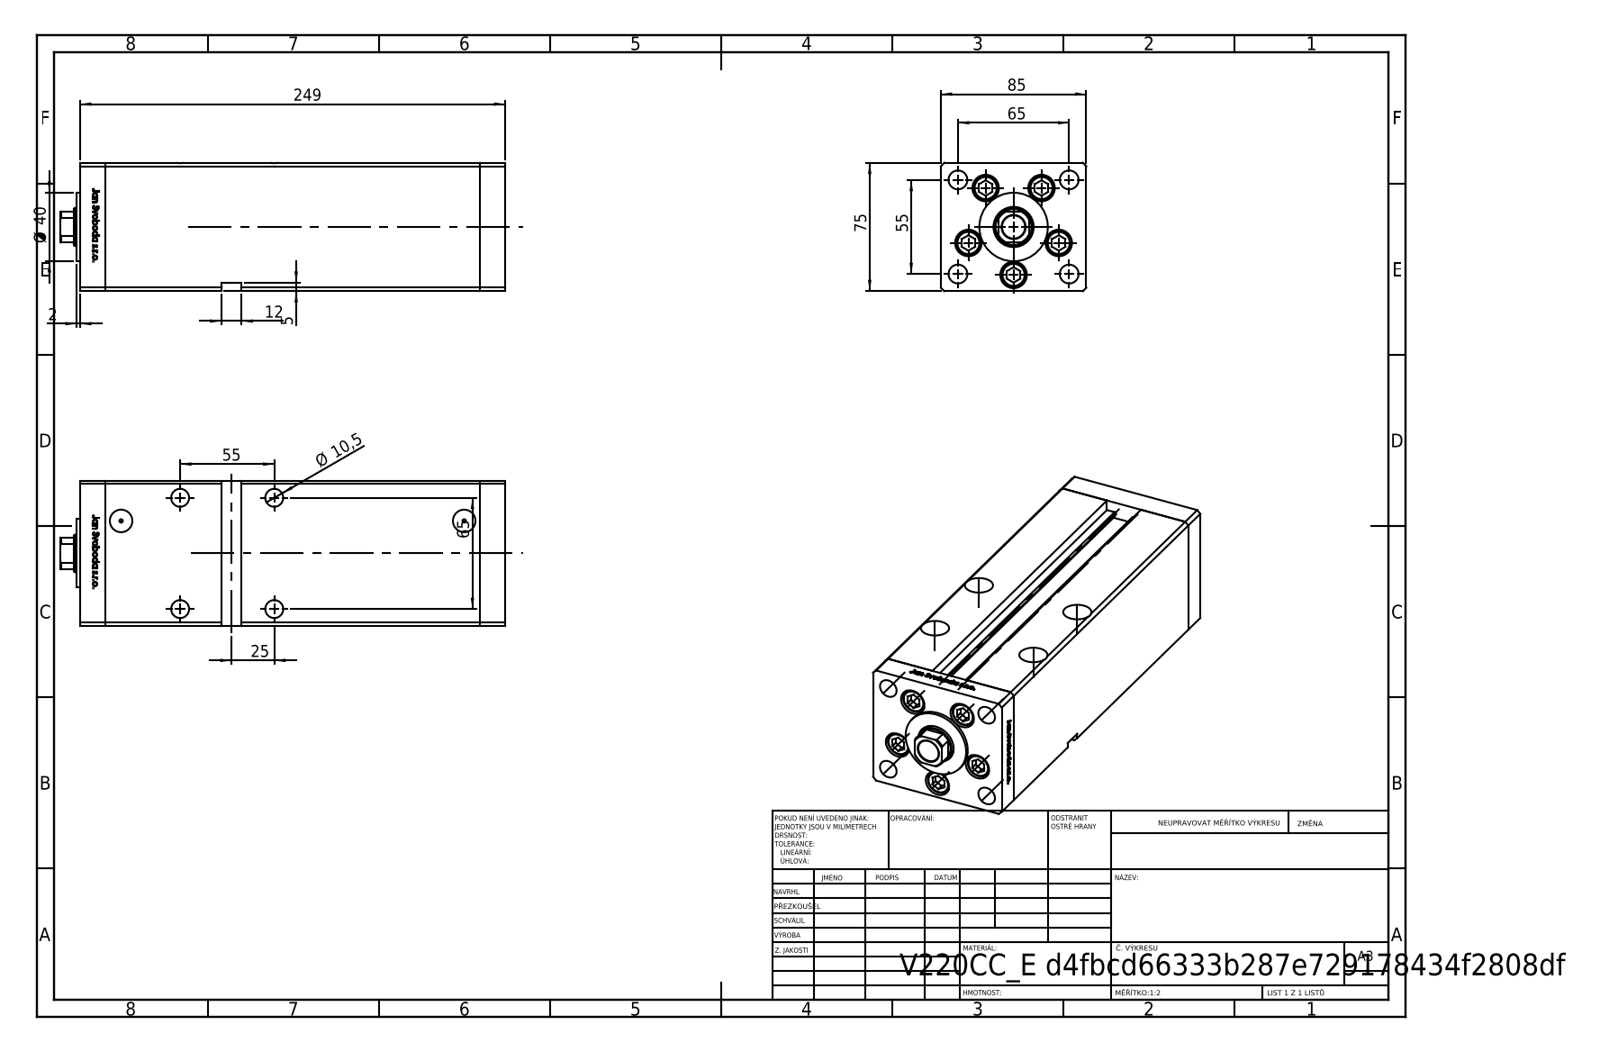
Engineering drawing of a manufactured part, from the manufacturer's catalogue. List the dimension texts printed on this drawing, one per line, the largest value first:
249
85
75
65
65
55
55
Ø 40
25
12
Ø 10,5
5
2
